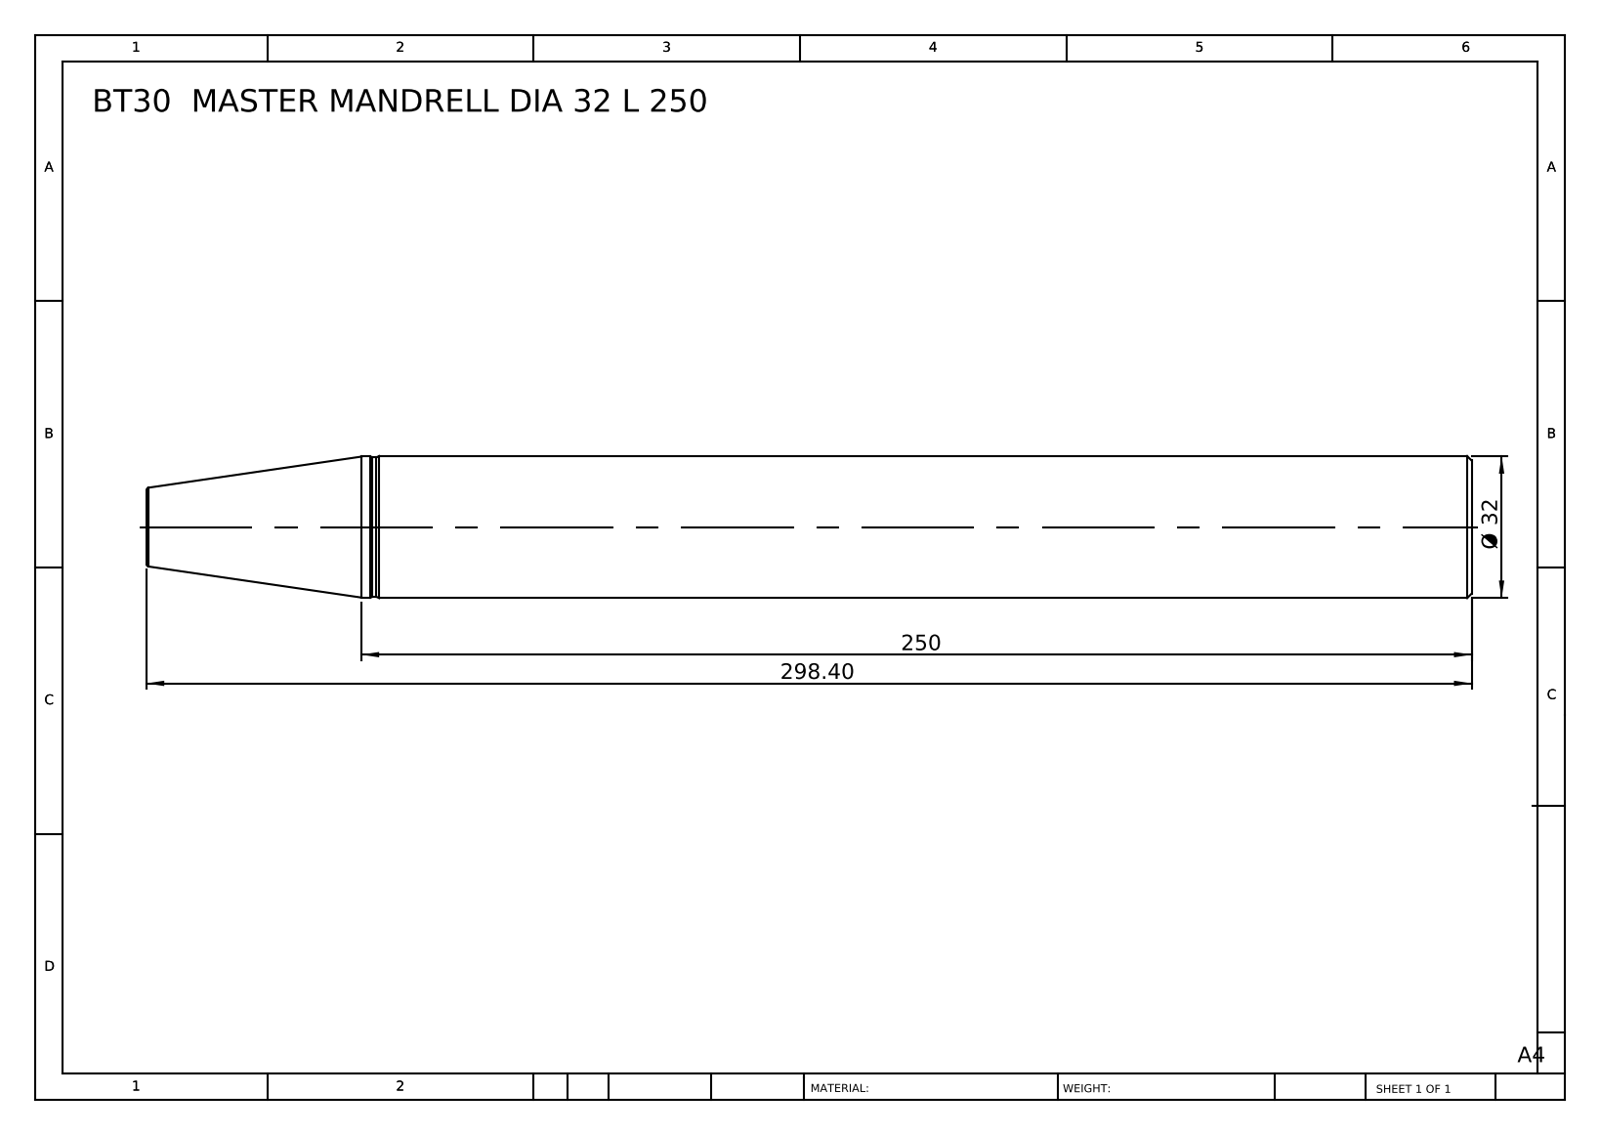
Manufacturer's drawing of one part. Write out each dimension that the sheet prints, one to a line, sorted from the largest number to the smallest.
298.40
250
Ø 32
